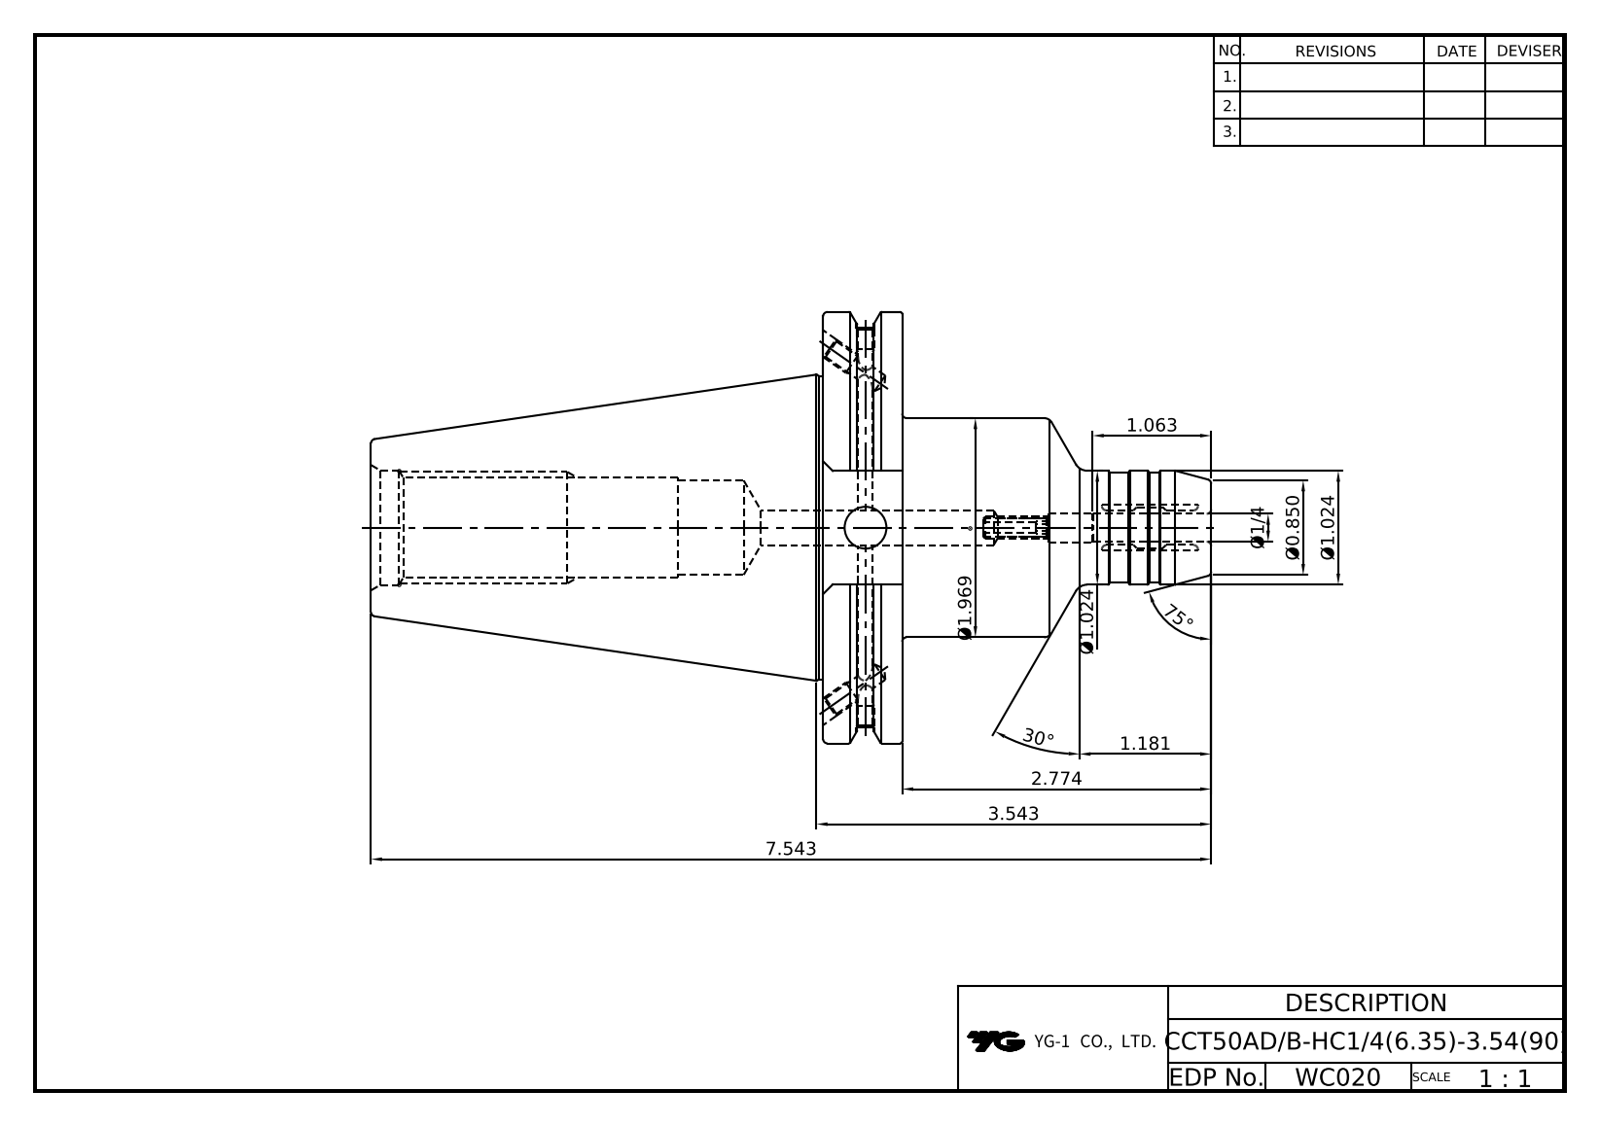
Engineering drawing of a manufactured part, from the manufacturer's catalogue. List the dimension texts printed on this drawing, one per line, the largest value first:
75°
30°
7.543
3.543
2.774
Ø1.969
1.181
1.063
Ø1.024
Ø1.024
Ø0.850
Ø1/4
